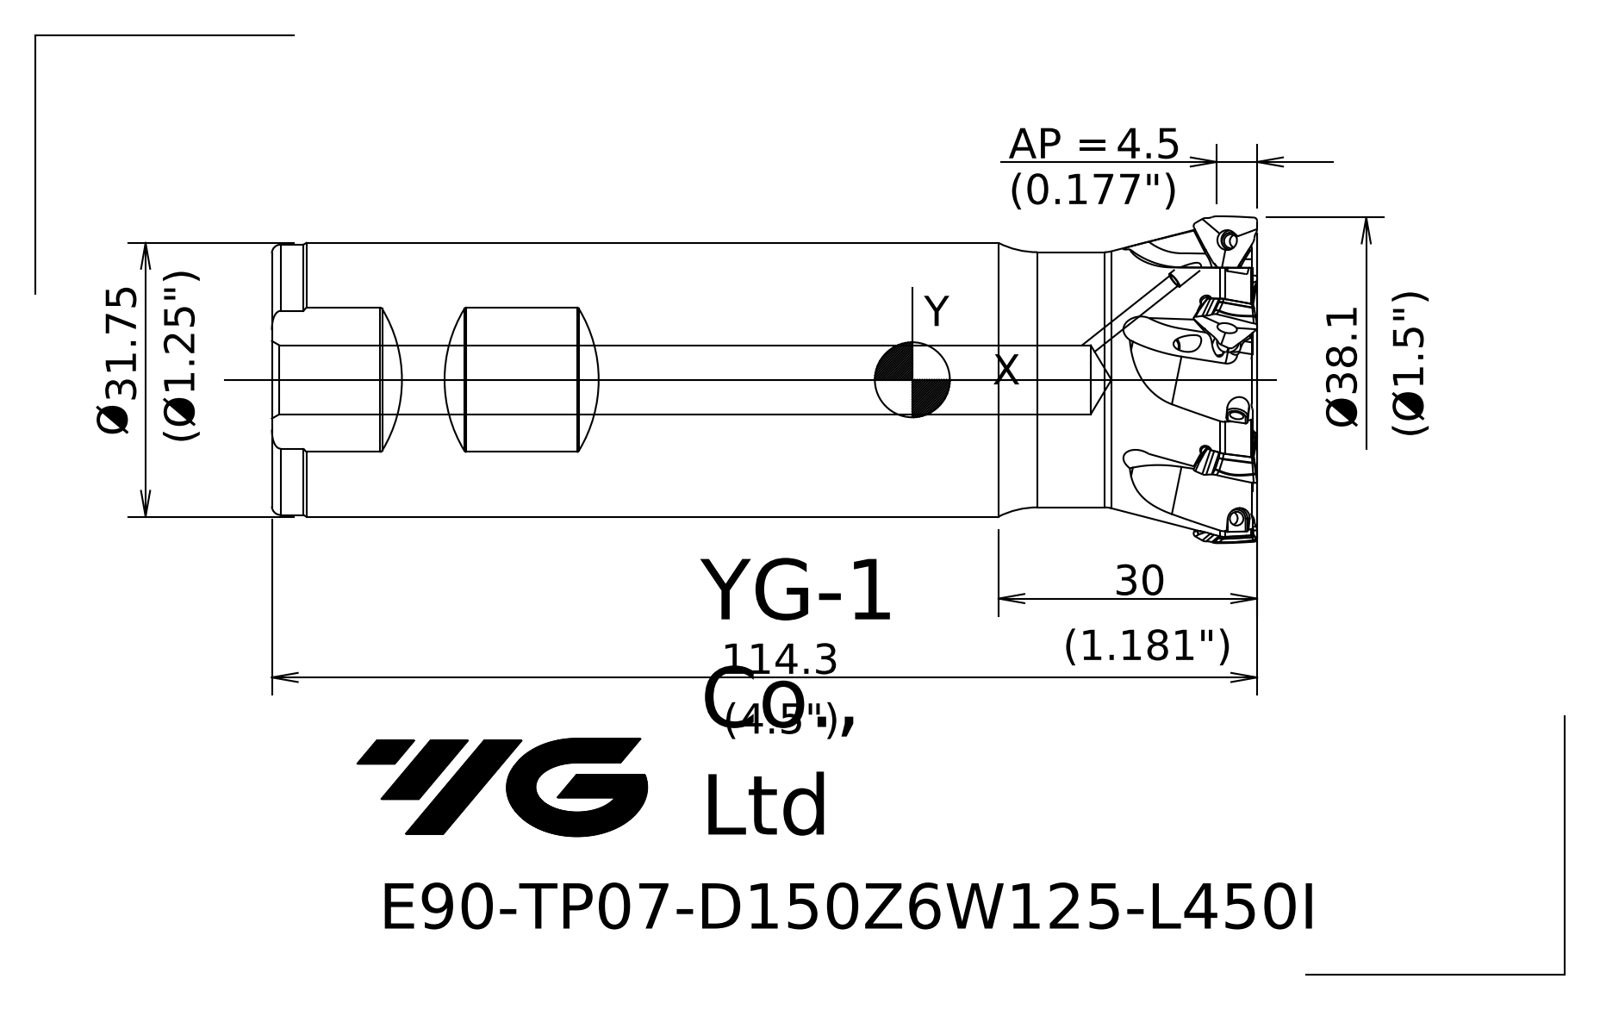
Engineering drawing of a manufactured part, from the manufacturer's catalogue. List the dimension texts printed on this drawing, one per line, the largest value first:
114.3
Ø38.1
30
4.5 AP =
